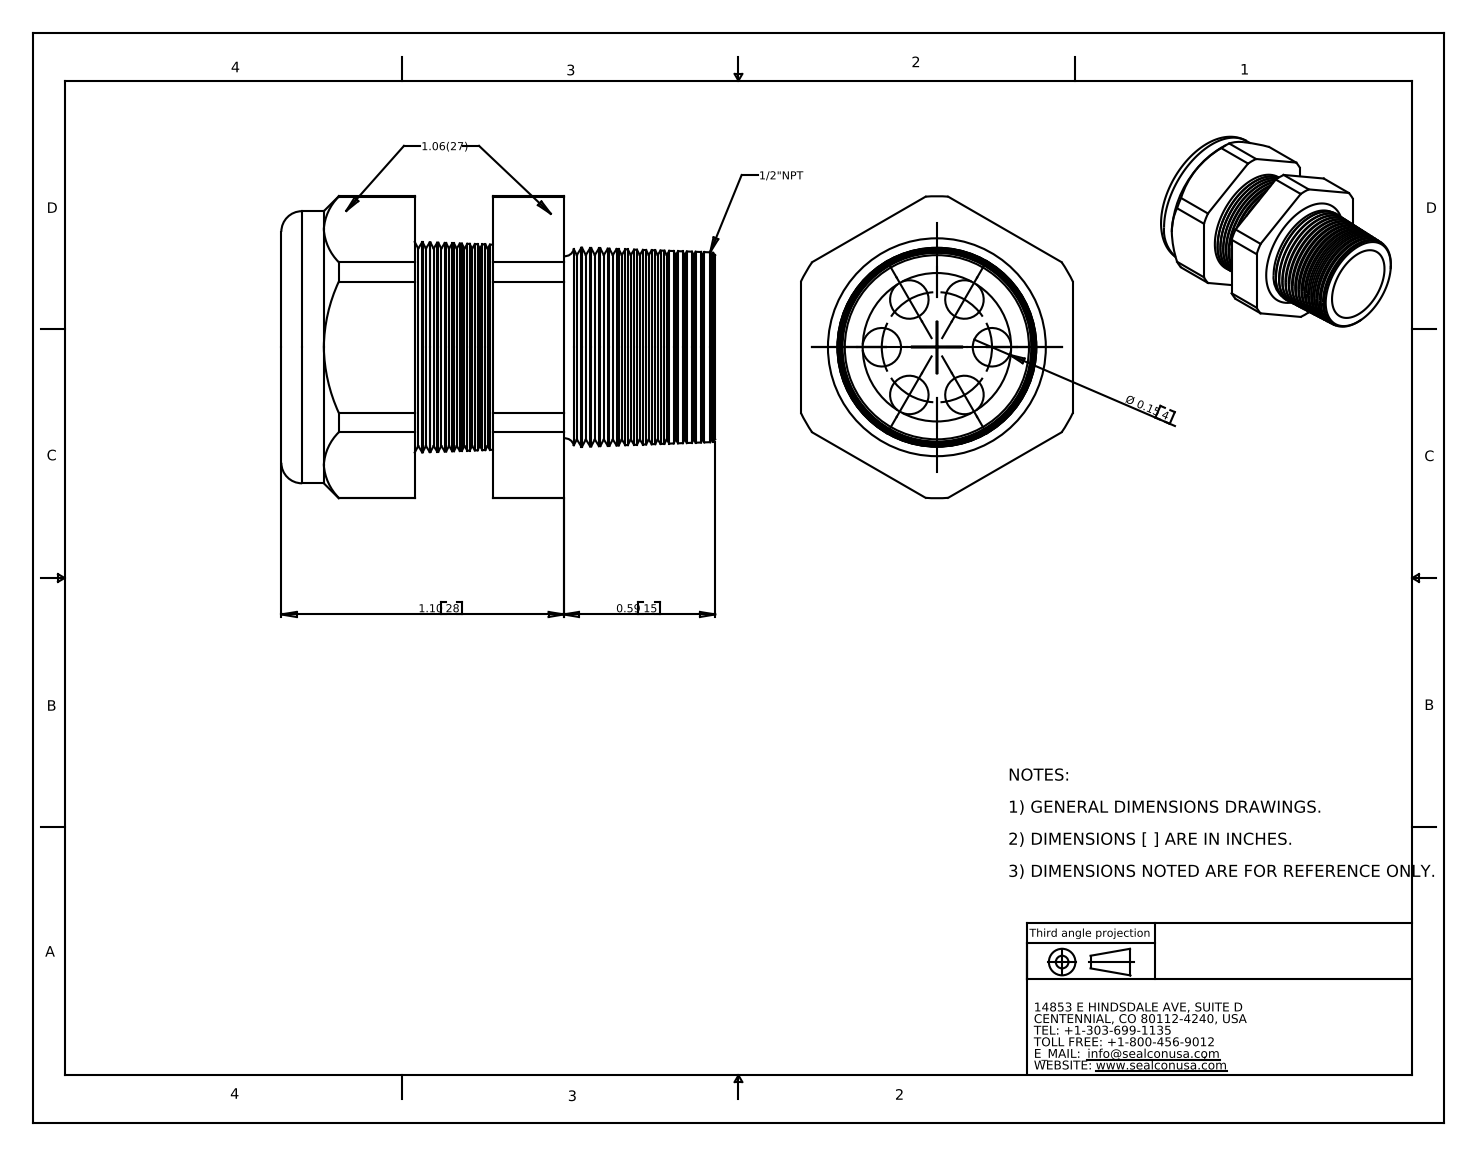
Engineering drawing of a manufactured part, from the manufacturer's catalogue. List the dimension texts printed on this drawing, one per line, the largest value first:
1.10 28
0.59 15
Ø 0.15 4
